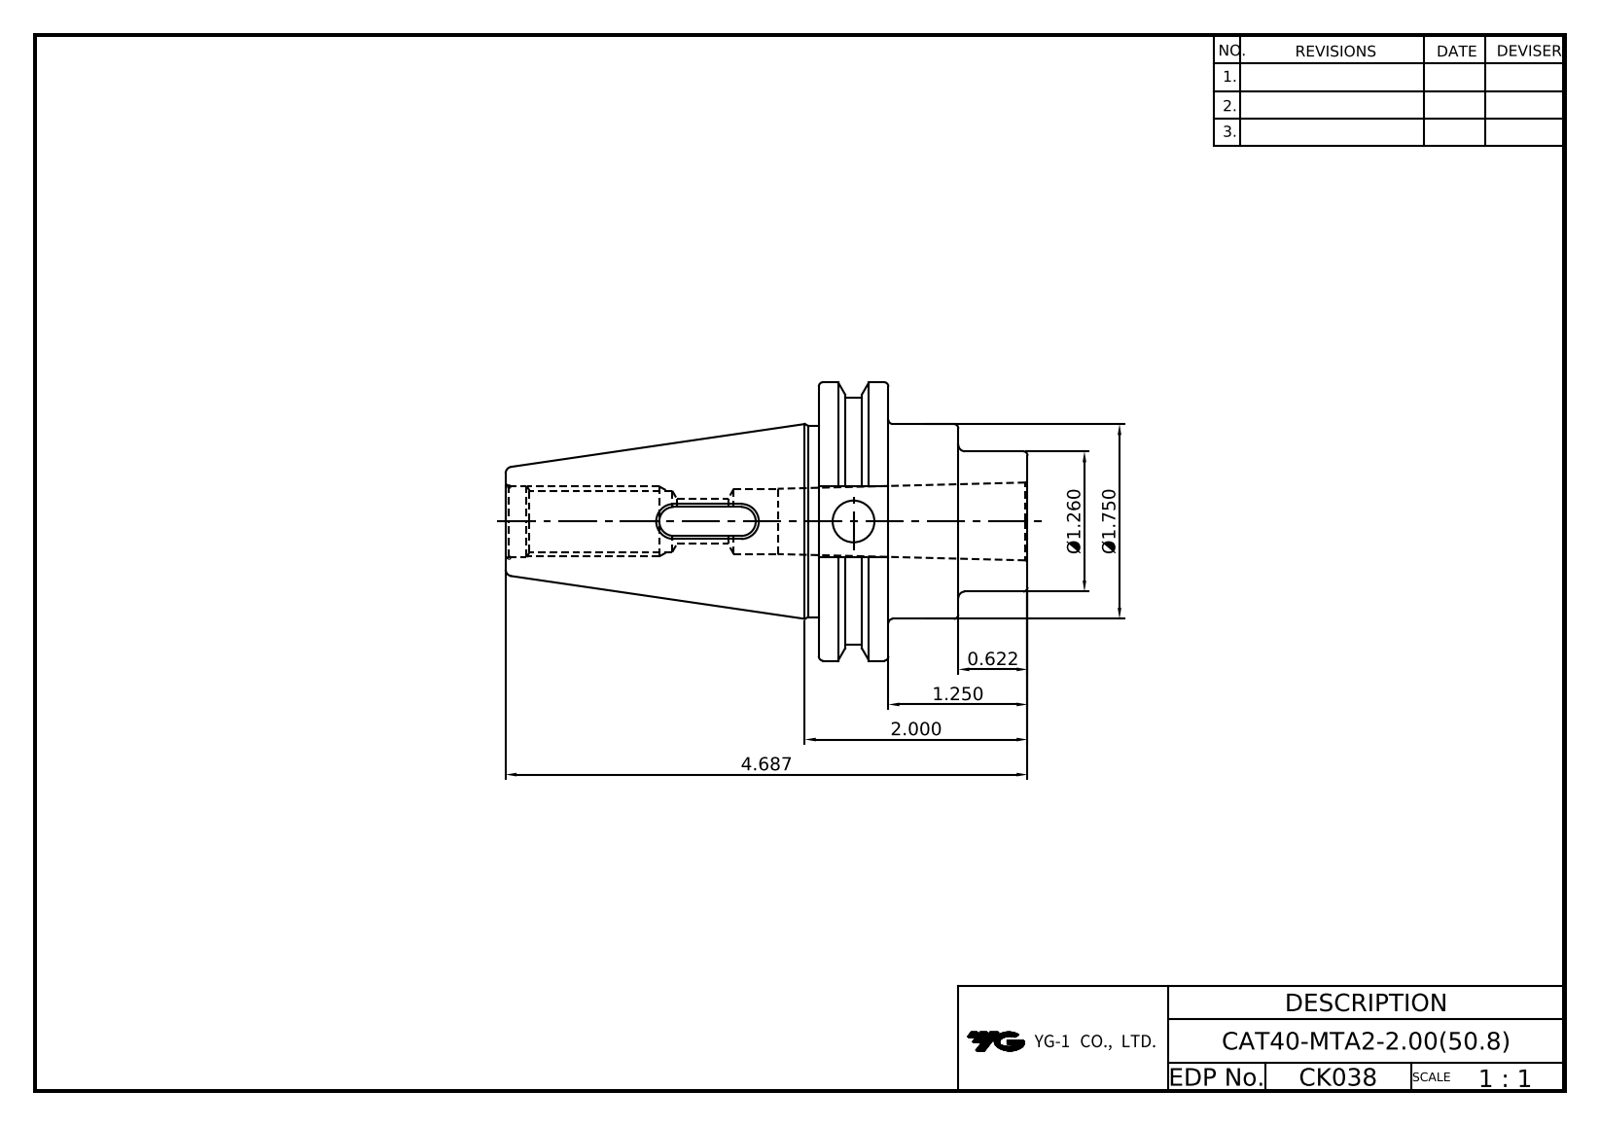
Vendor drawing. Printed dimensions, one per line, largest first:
4.687
2.000
Ø1.750
Ø1.260
1.250
0.622
